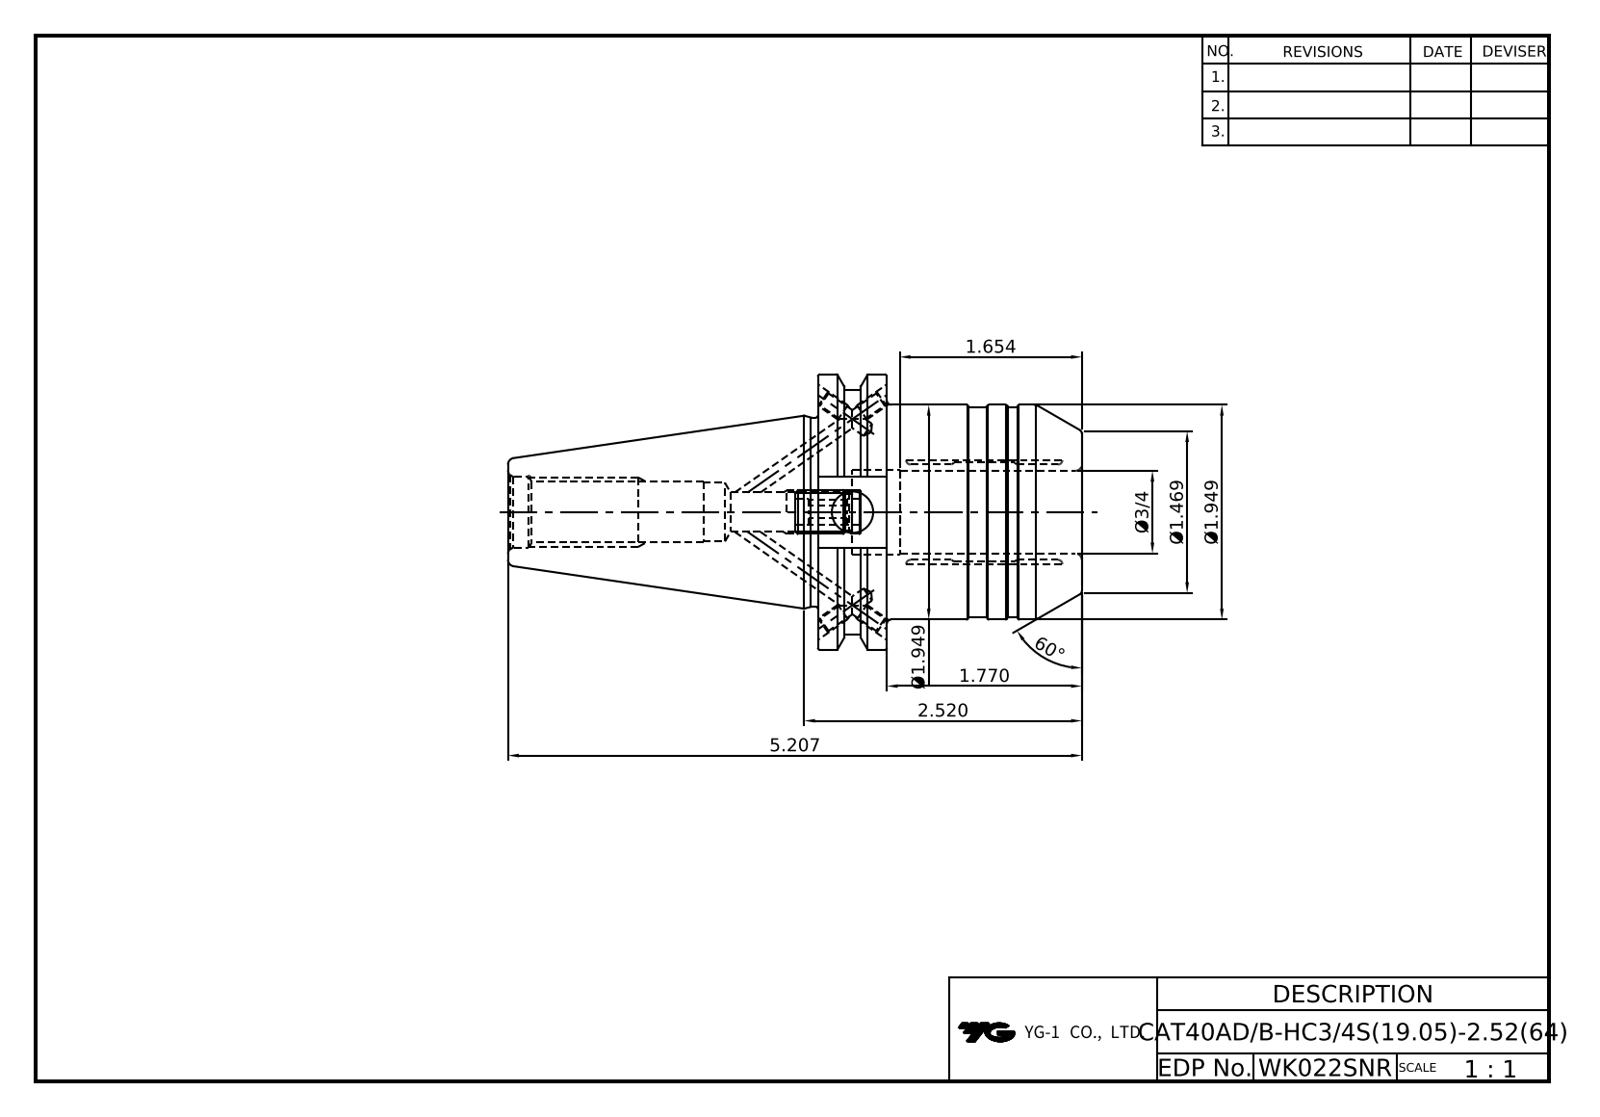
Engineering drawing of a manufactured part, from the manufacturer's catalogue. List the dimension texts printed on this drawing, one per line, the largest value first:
60°
5.207
2.520
Ø1.949
Ø1.949
1.770
1.654
Ø1.469
Ø3/4
